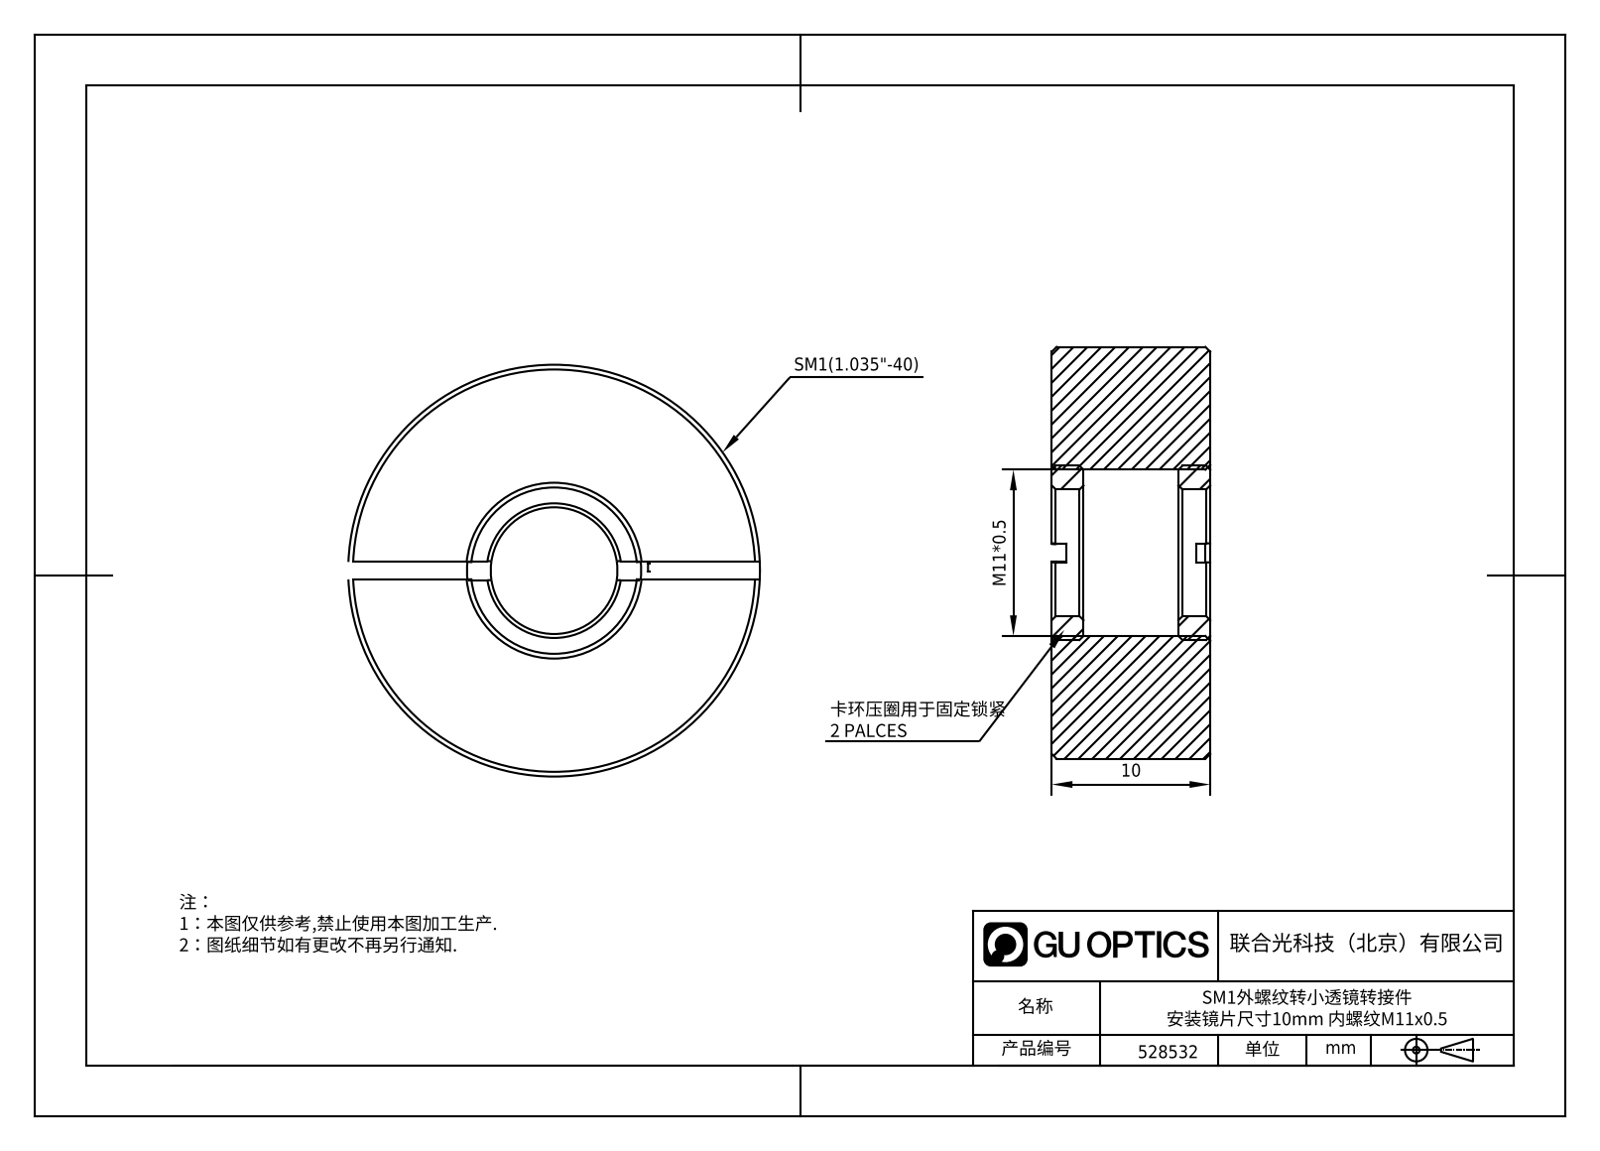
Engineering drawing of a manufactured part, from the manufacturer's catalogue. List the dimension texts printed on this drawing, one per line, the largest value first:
M11*0.5
10
